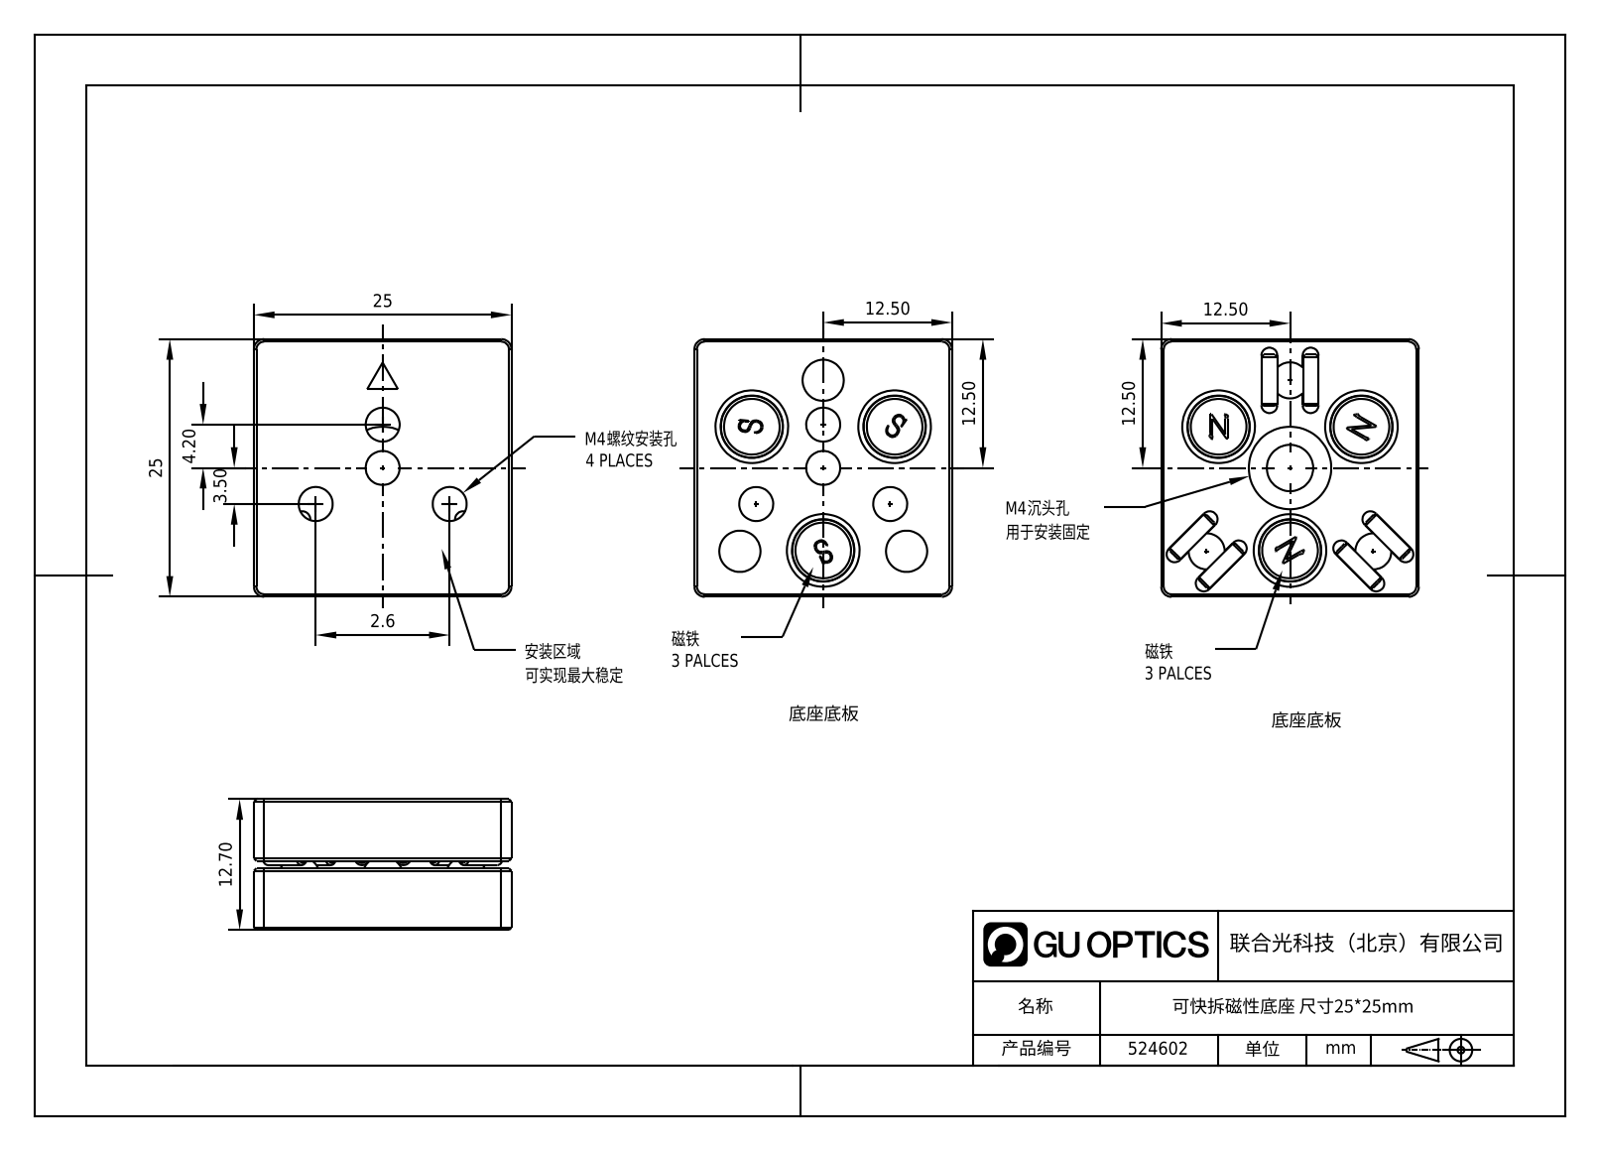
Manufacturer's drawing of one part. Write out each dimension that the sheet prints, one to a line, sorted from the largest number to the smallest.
25
25
12.70
12.50
12.50
12.50
12.50
4.20
3.50
2.6
